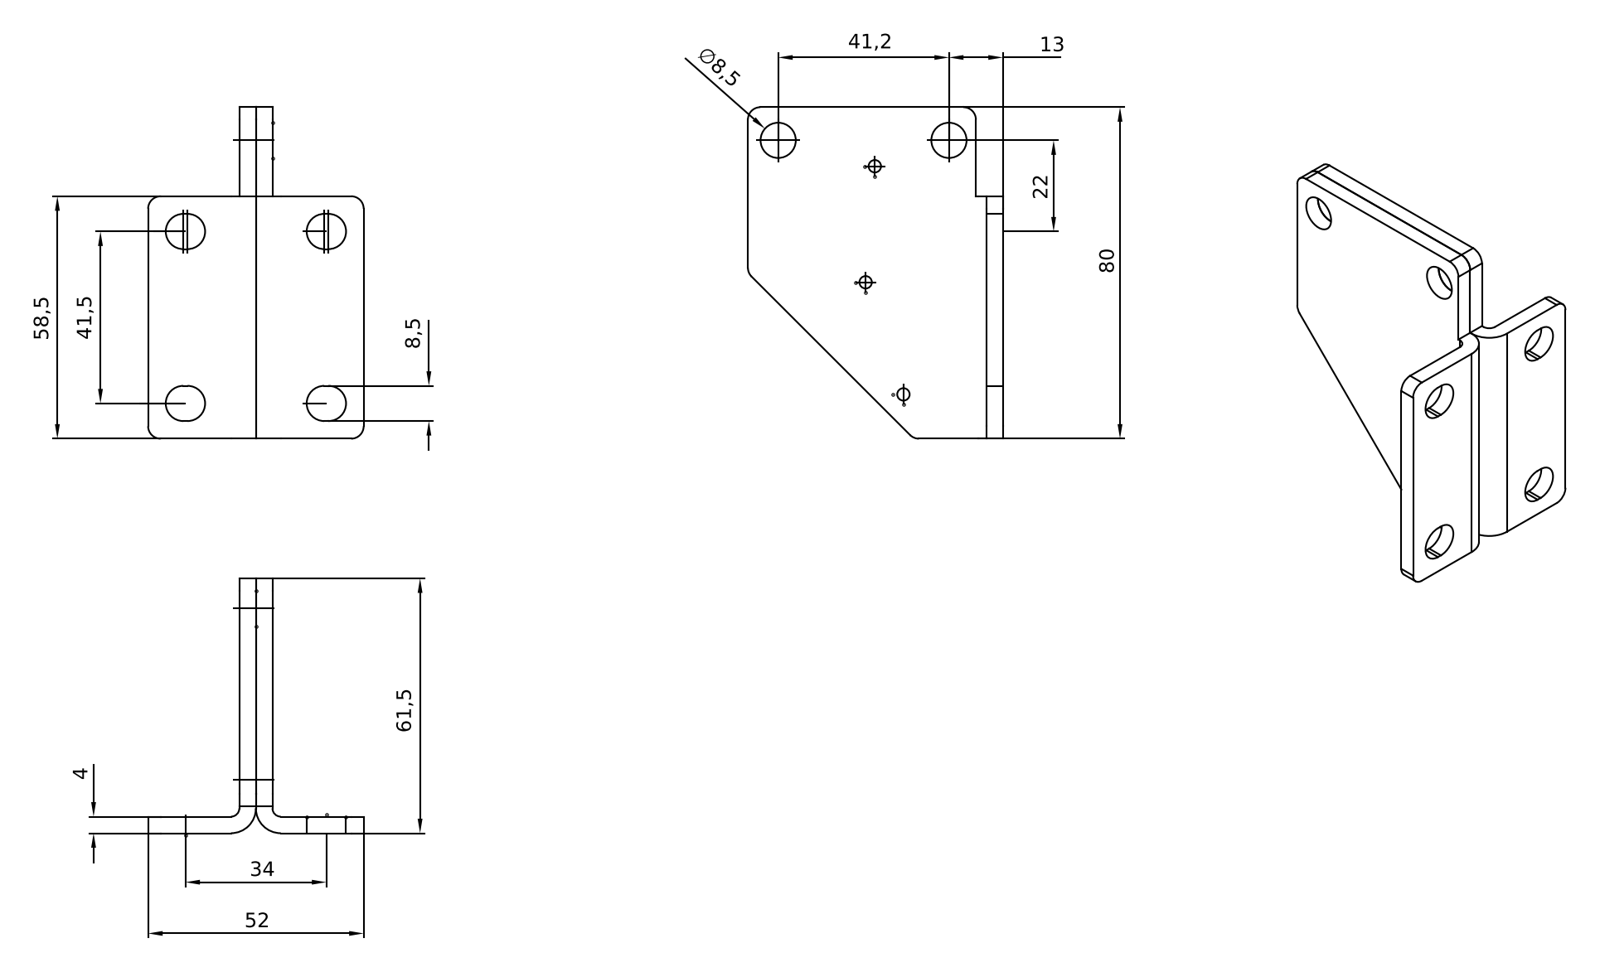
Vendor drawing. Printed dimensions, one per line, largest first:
80
61,5
58,5
52
41,5
41,2
34
22
13
∅8,5
8,5
4
